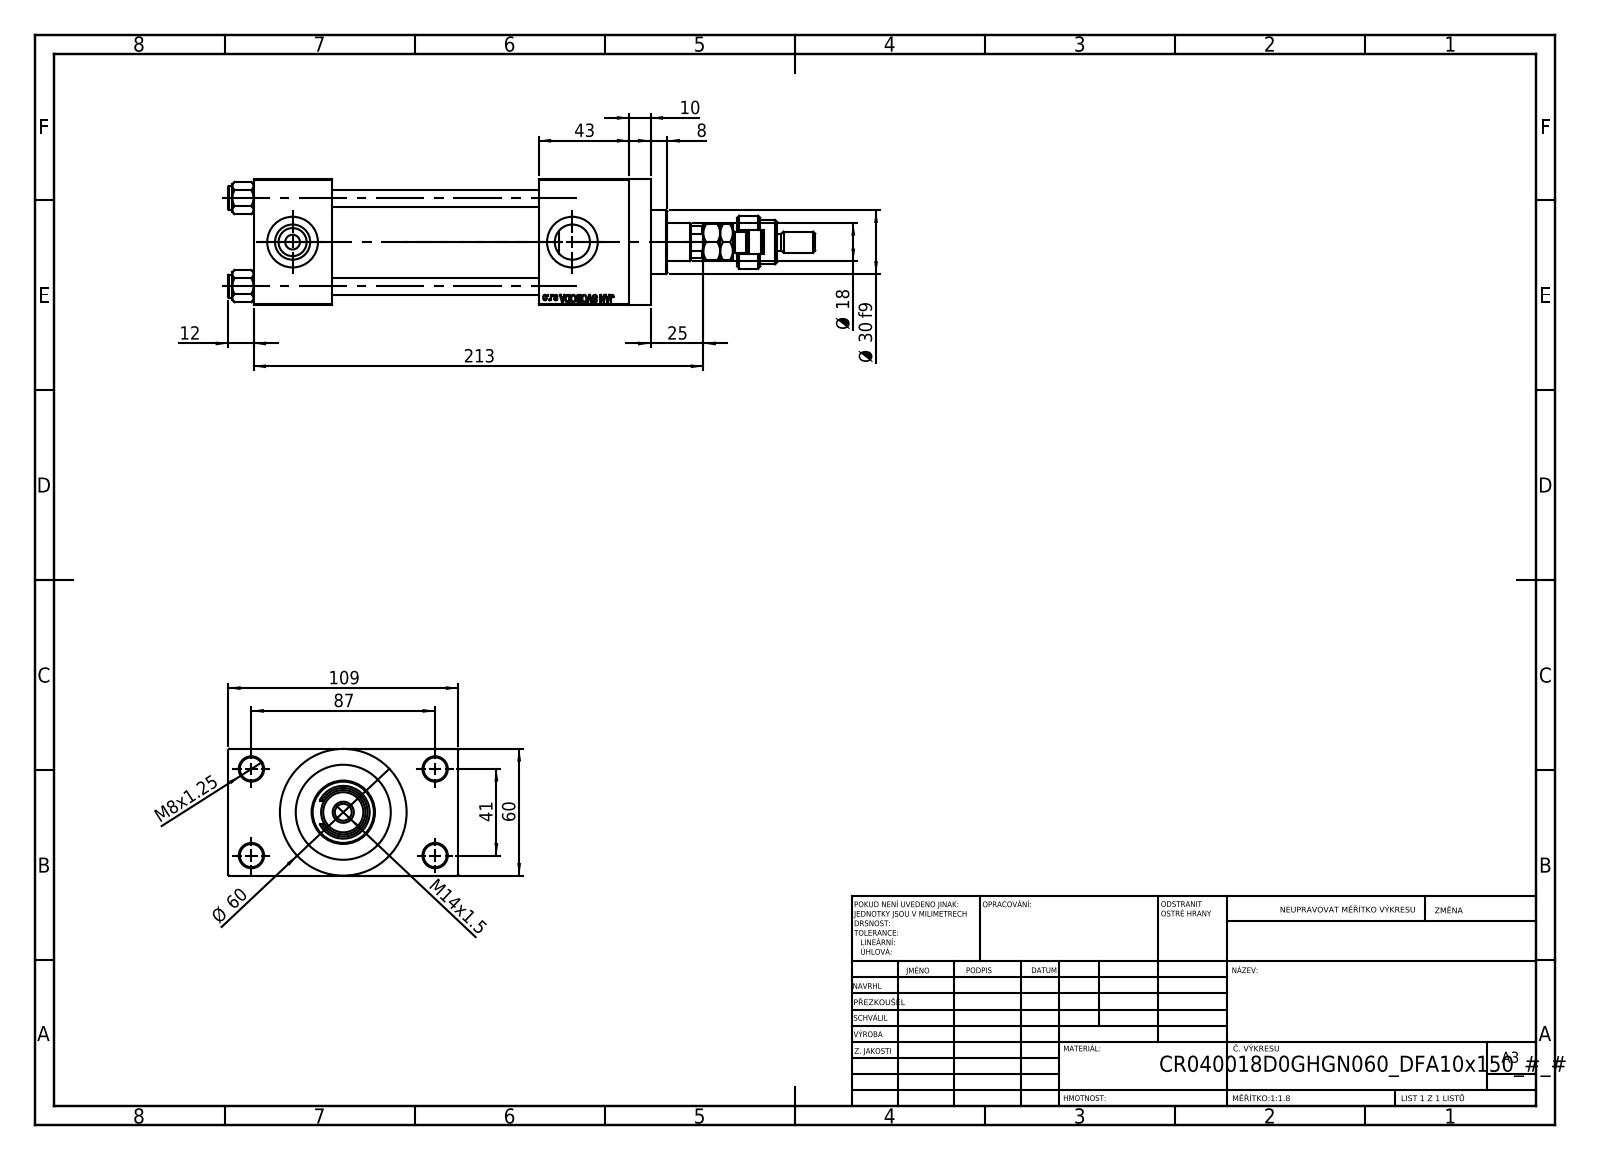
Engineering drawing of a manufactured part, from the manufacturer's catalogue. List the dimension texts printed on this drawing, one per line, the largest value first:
213
109
87
Ø 60
60
43
41
Ø 30 f9
25
Ø 18
M14x1.5
12
10
8
M8x1.25
